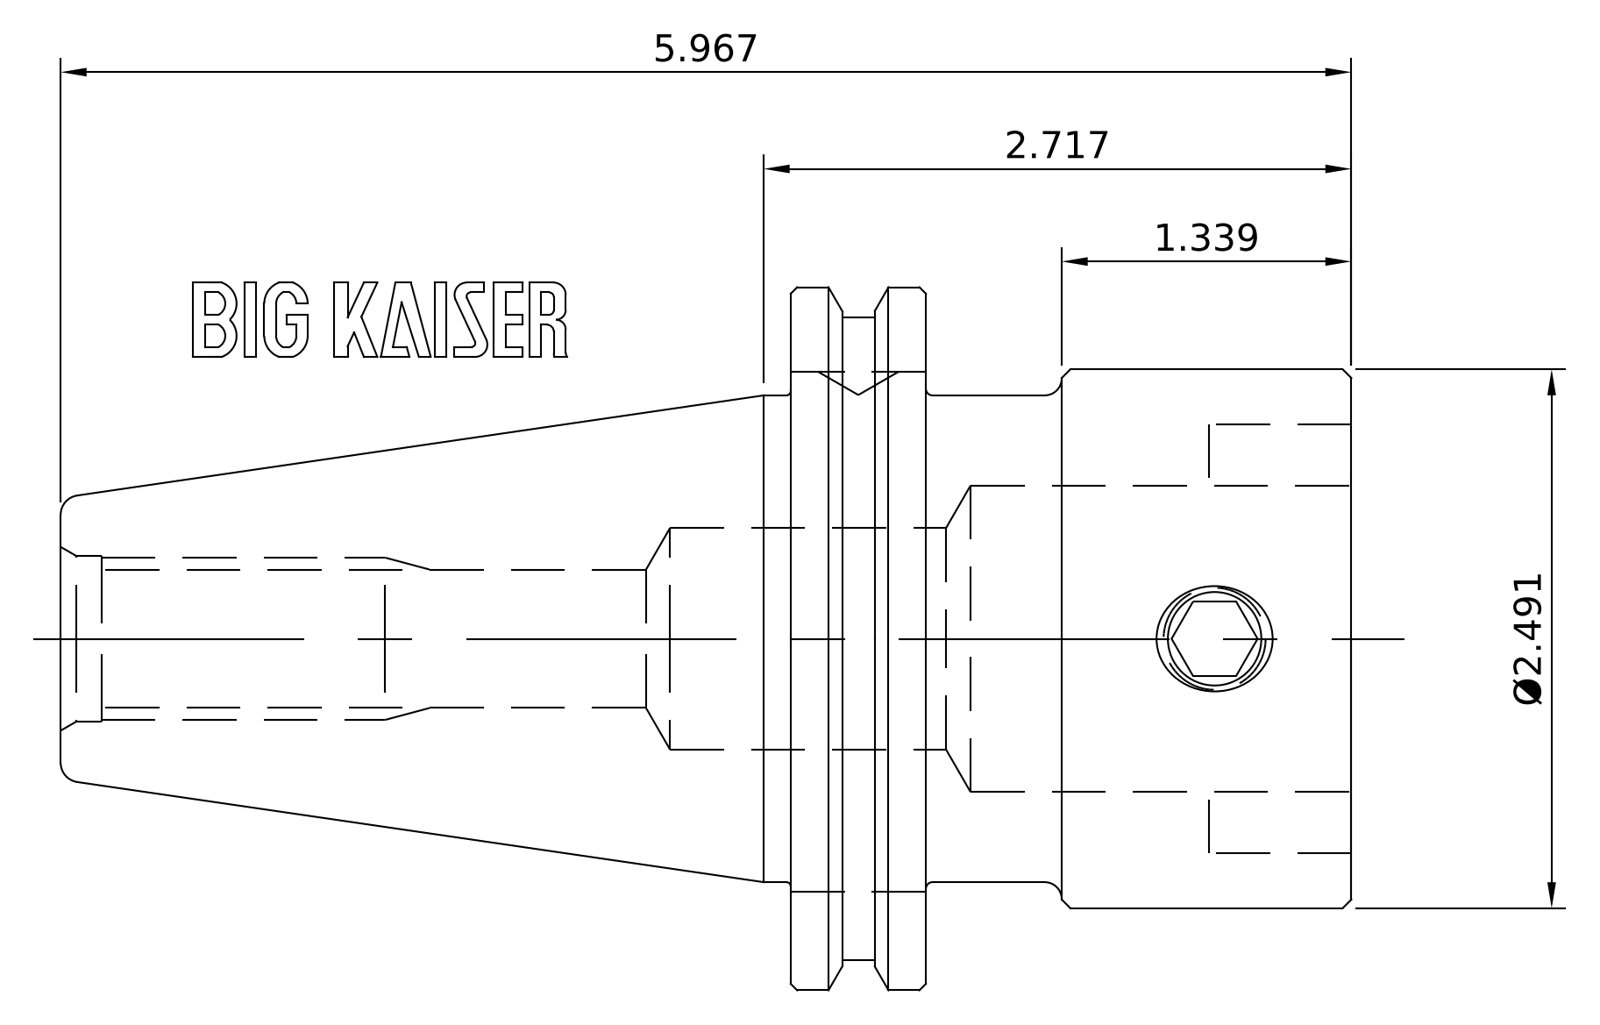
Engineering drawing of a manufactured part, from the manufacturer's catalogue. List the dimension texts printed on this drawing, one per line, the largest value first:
5.967
2.717
Ø2.491
1.339
